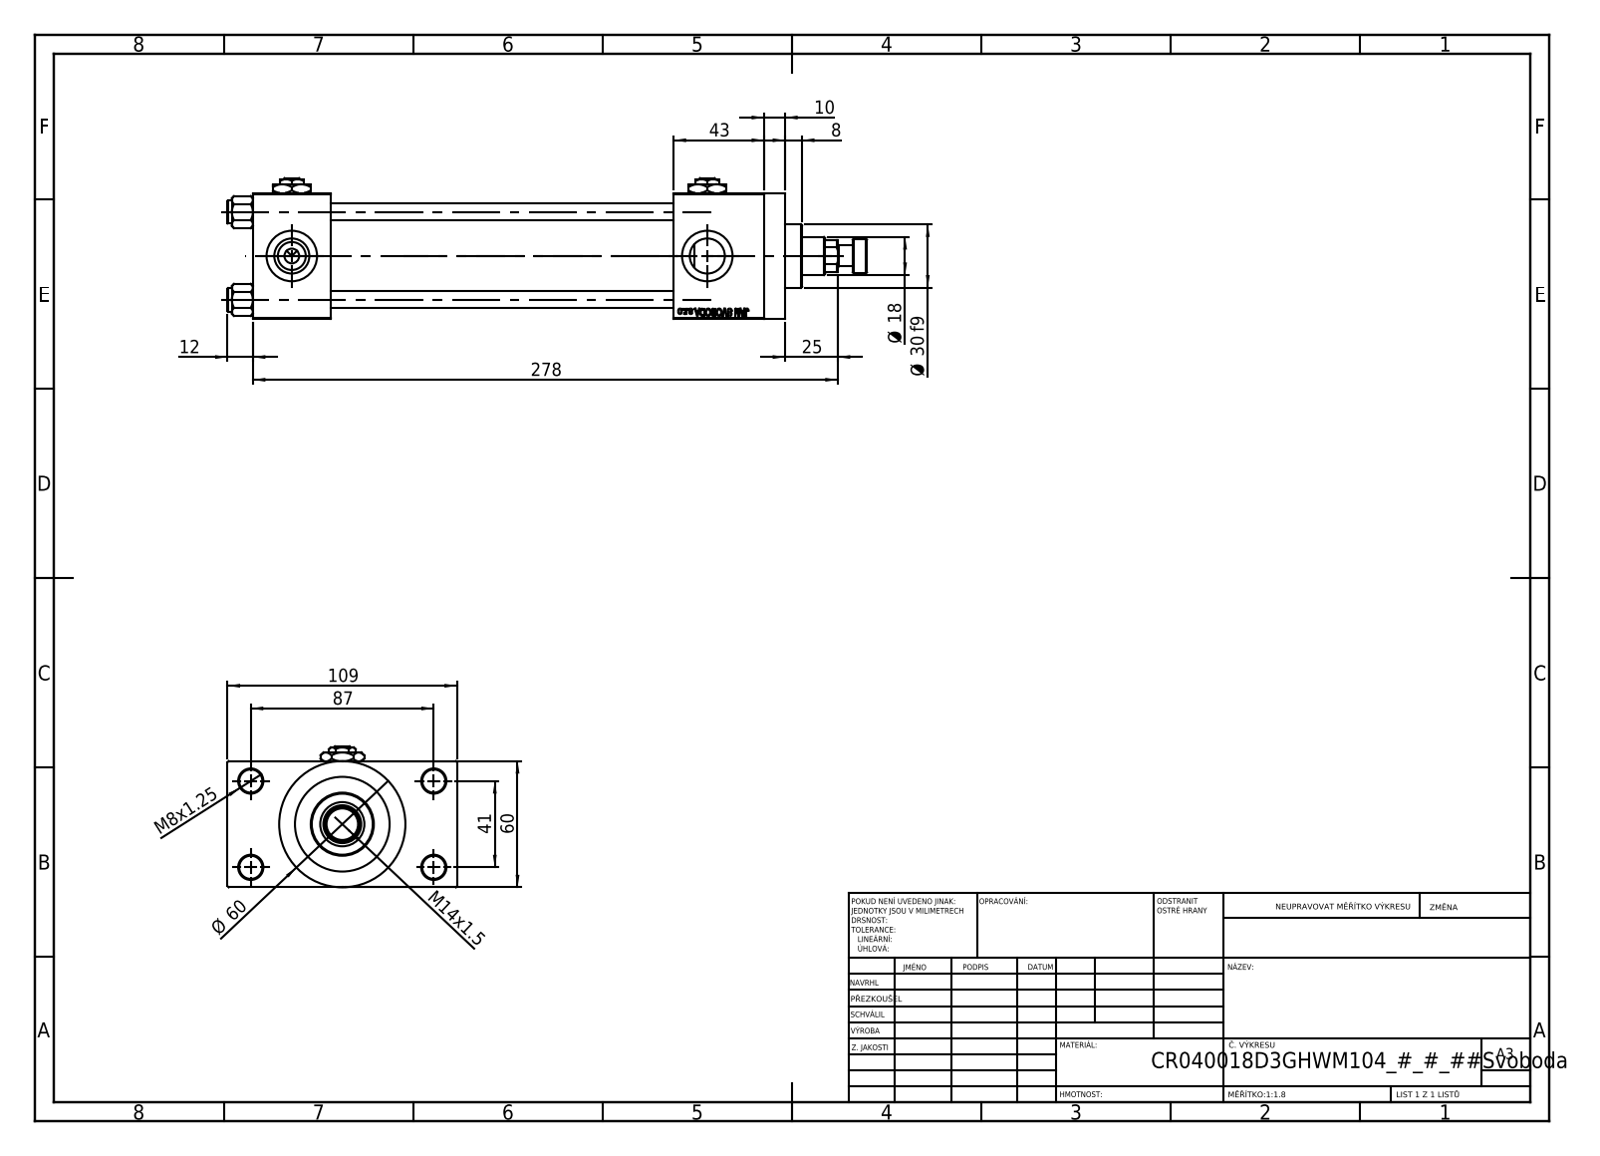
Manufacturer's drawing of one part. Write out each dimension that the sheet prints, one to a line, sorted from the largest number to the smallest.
278
109
87
Ø 60
60
43
41
Ø 30 f9
25
Ø 18
M14x1.5
12
10
8
M8x1.25
